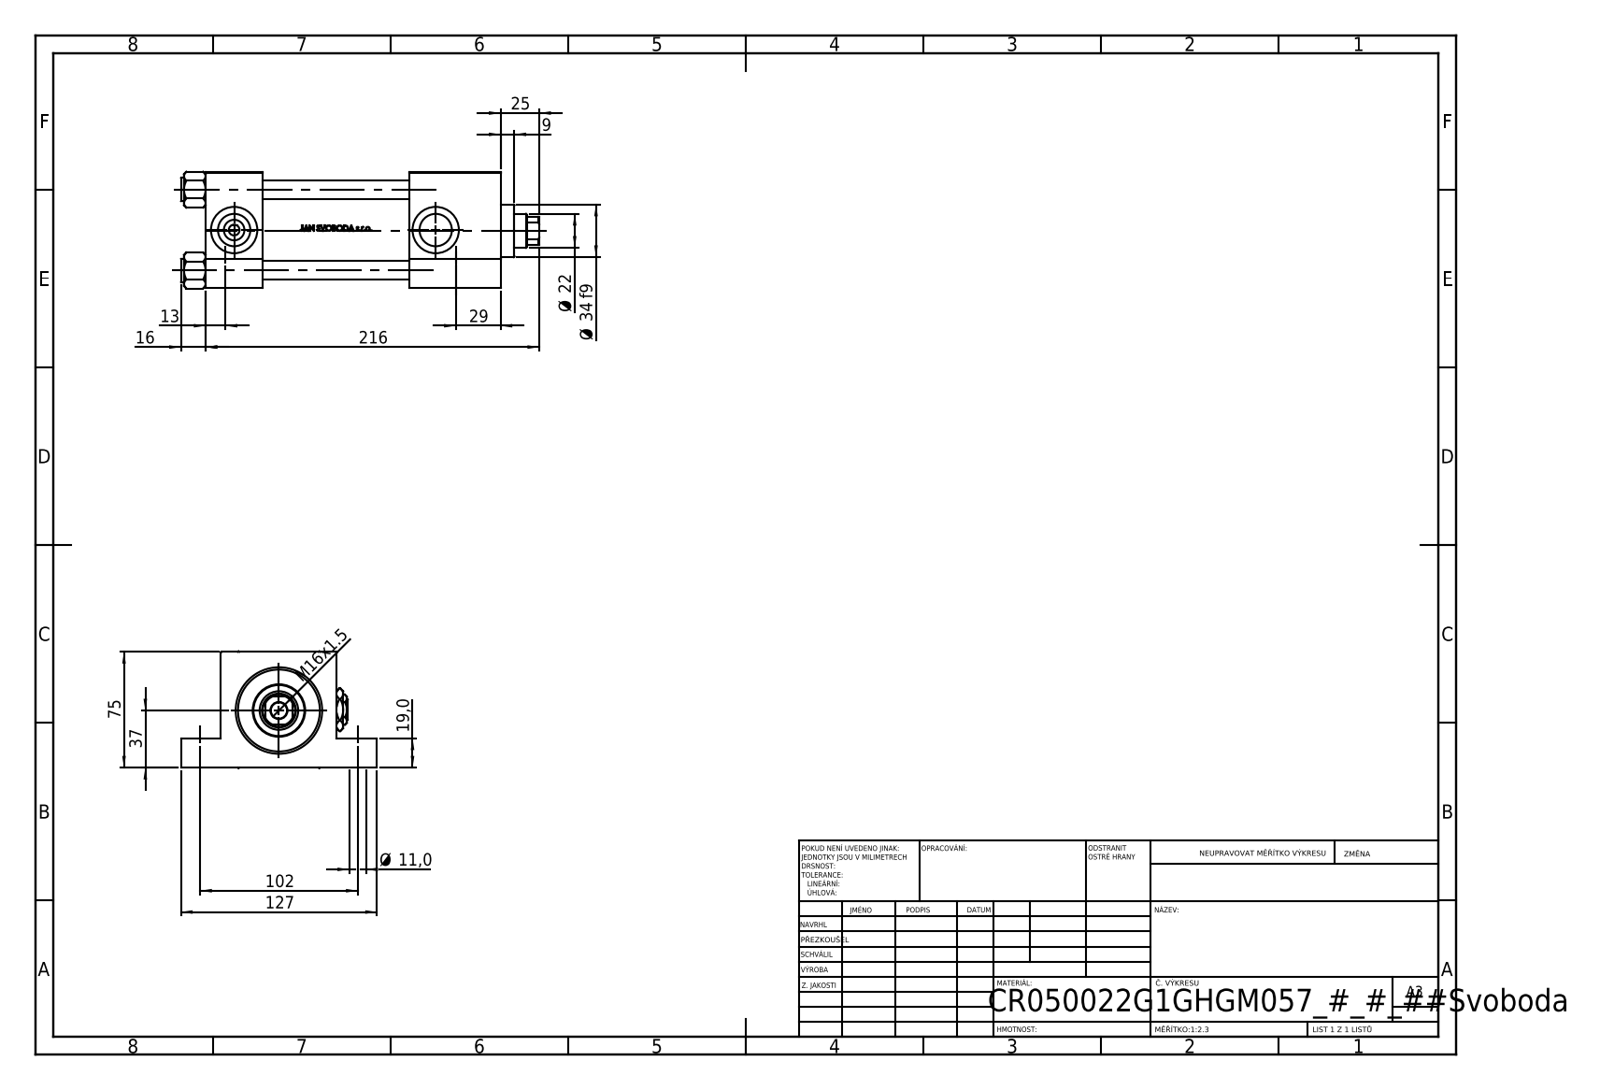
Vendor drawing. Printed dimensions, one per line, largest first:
216
127
102
75
37
Ø 34 f9
29
25
Ø 22
19,0
16
M16x1.5
13
Ø 11,0
9
